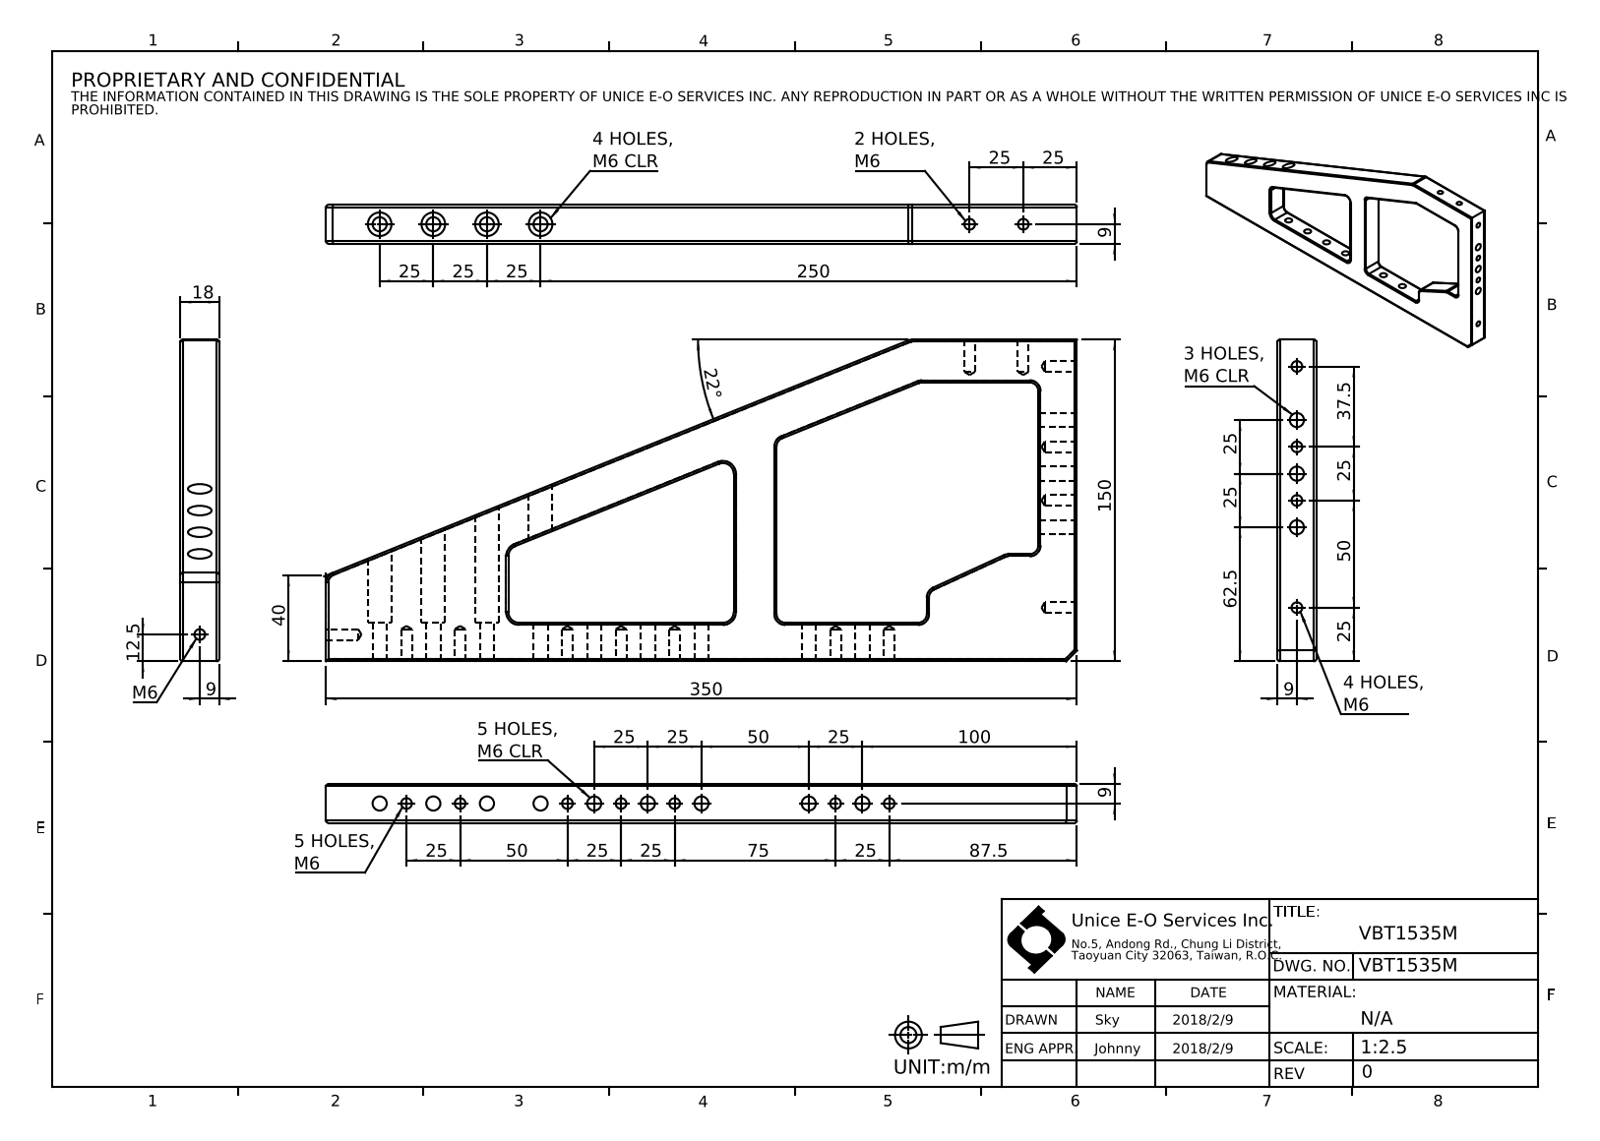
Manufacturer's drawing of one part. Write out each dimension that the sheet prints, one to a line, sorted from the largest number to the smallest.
350
250
150
100
87.5
75
62.5
50
50
50
40
37.5
25
25
25
25
25
25
25
25
25
25
25
25
25
25
25
25
22°
18
12.5
9
9
9
9
